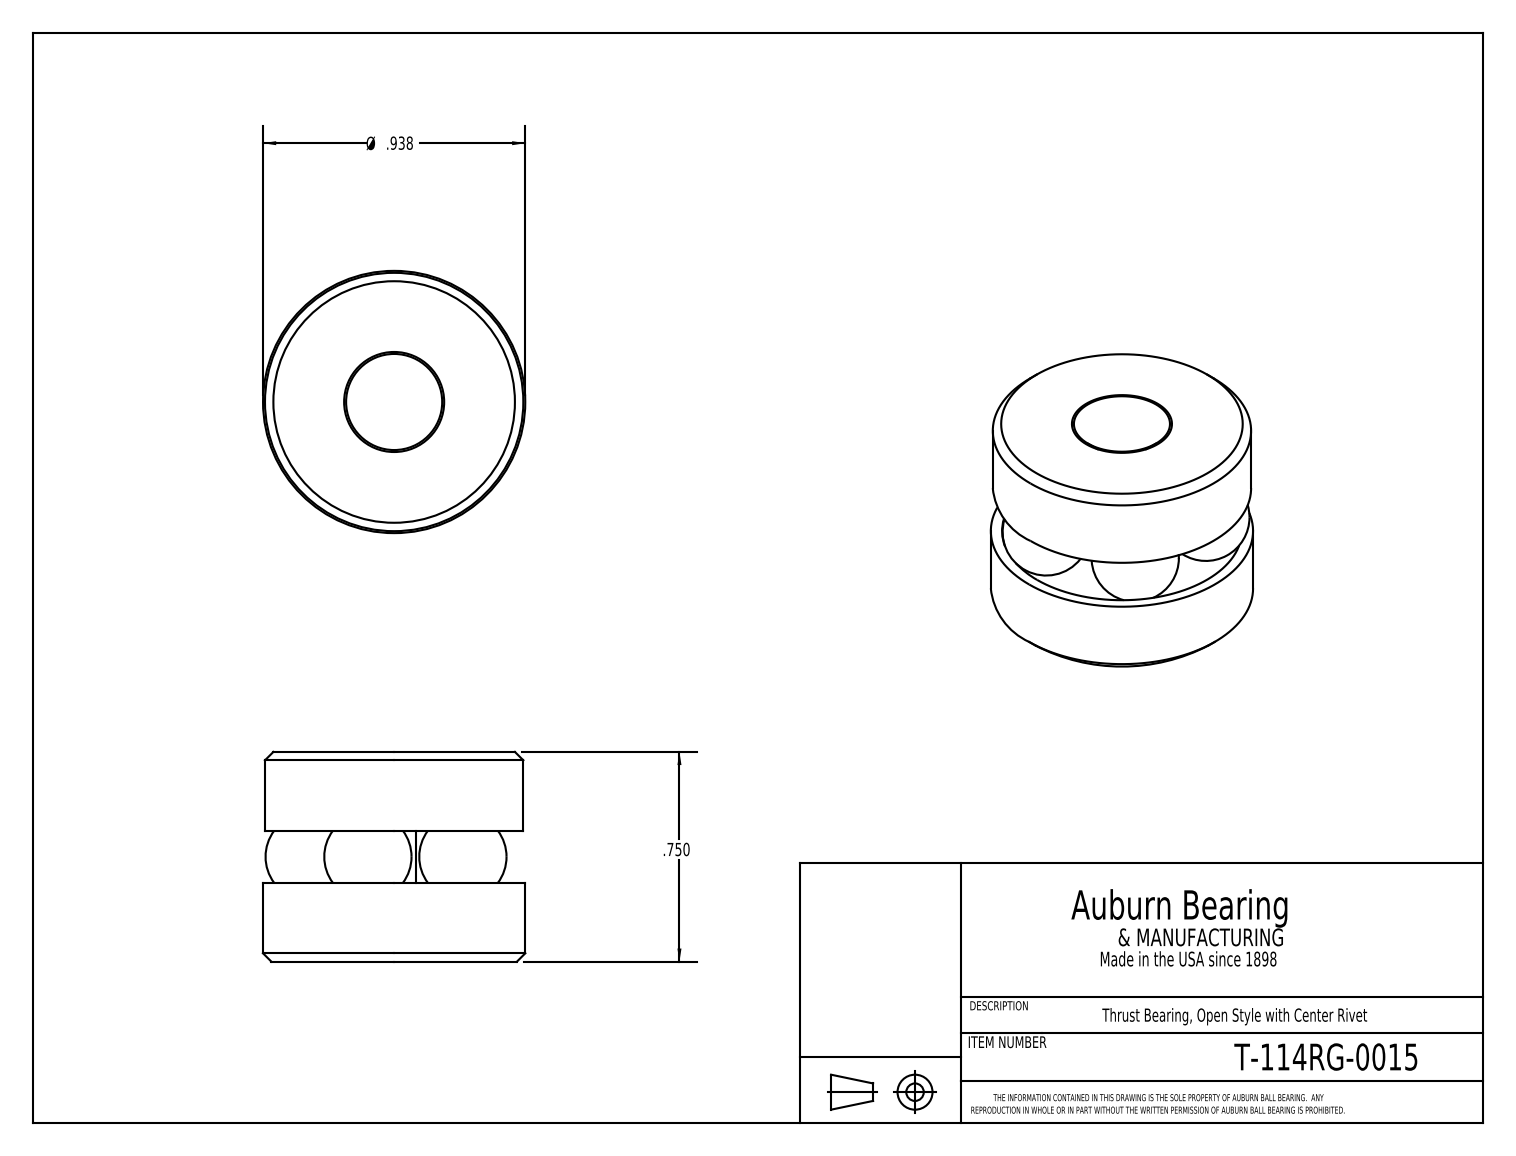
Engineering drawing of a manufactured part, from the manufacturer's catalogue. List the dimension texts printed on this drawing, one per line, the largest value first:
Ø .938
.750
